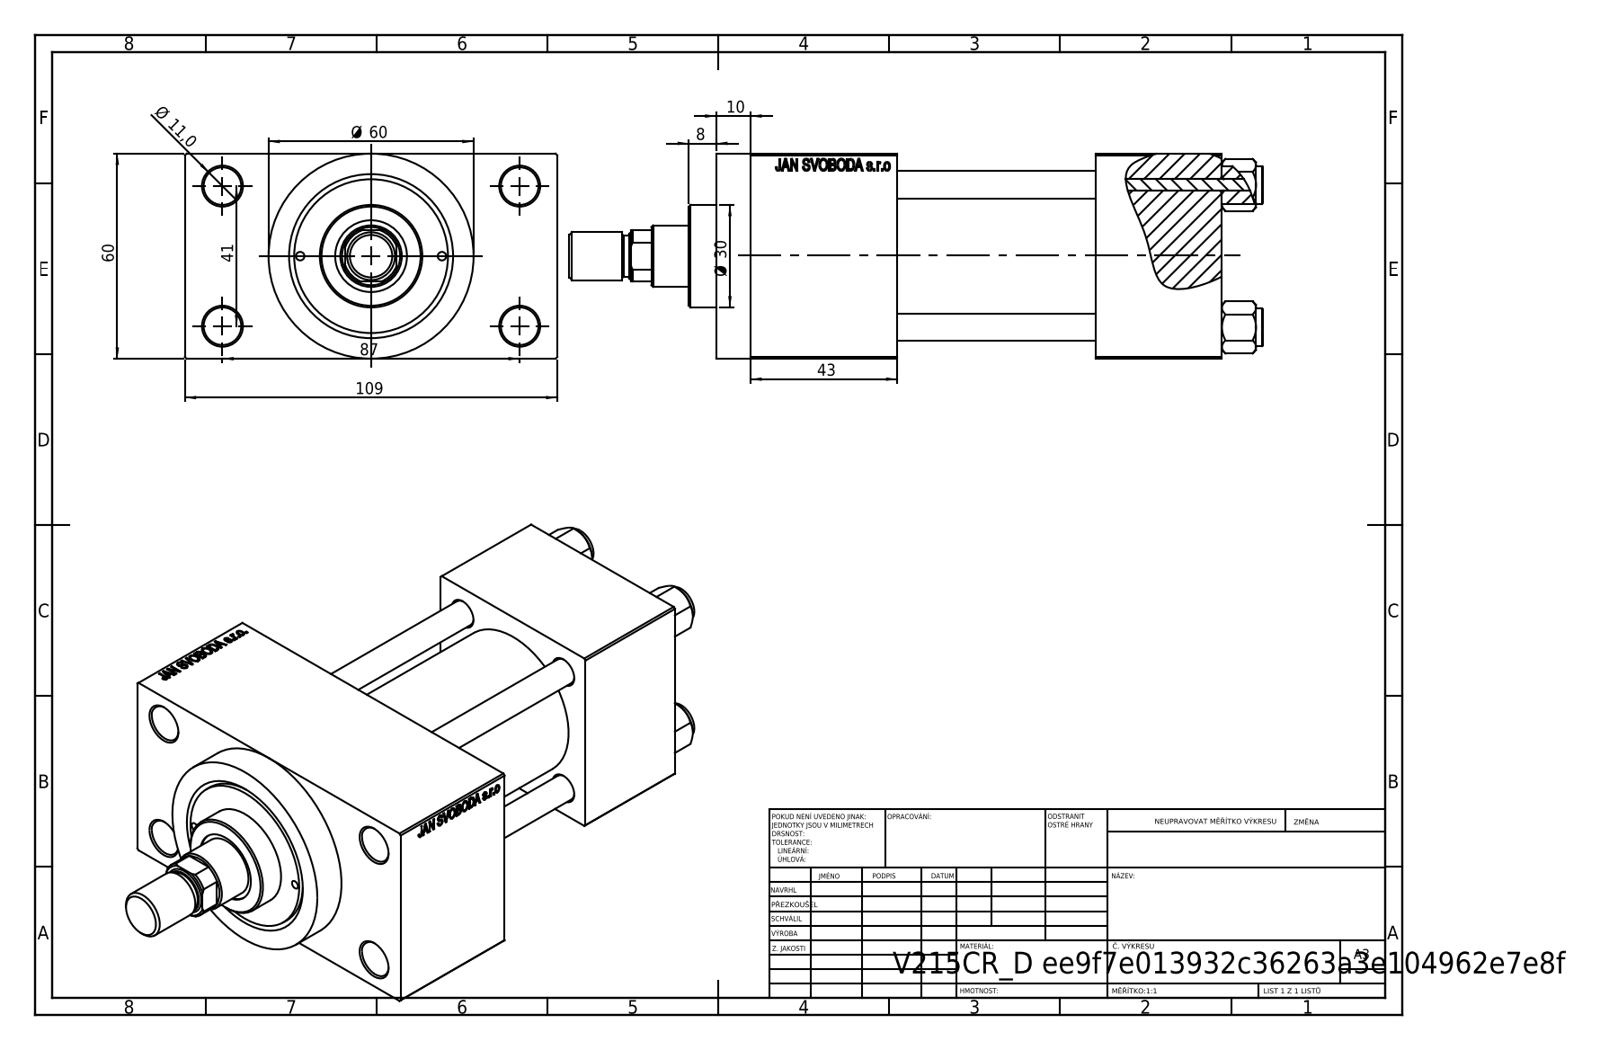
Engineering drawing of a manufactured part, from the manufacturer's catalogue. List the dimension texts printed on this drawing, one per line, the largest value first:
109
87
60
Ø 60
43
41
Ø 30
Ø 11,0
10
8
